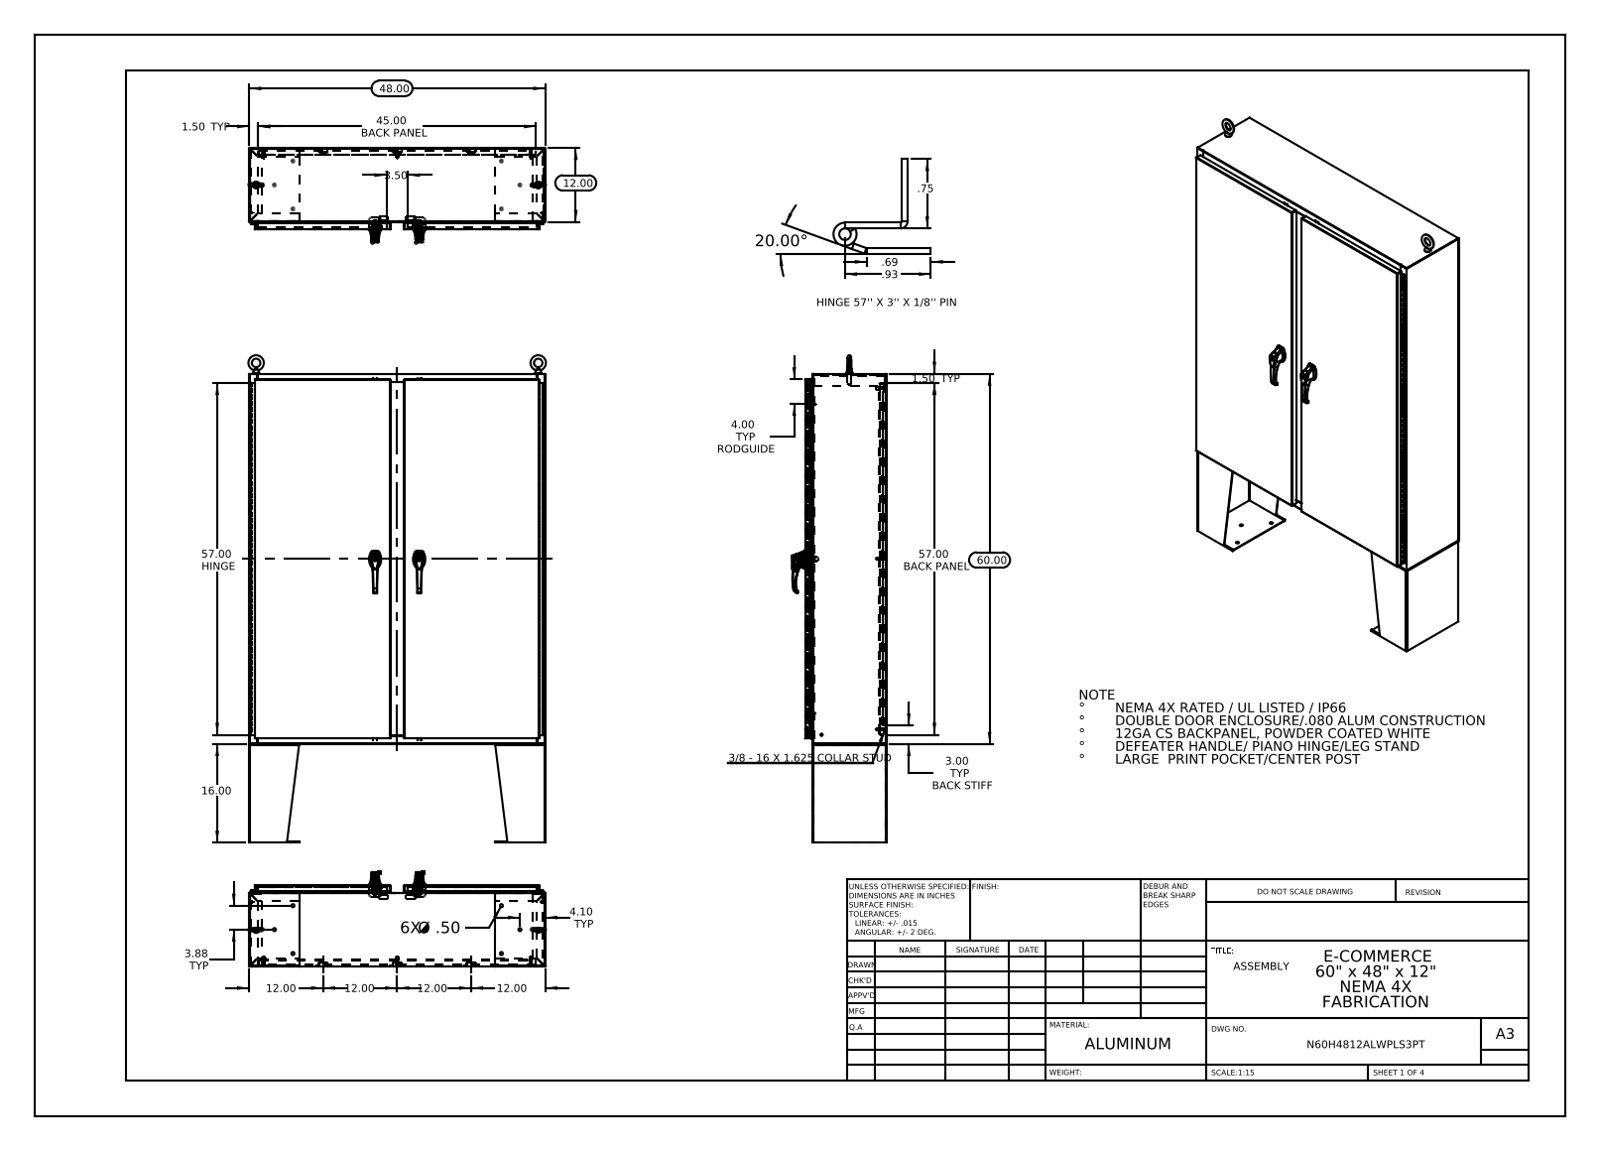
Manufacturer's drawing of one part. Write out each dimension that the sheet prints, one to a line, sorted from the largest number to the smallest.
60.00
57.00 HINGE
57.00 BACK PANEL
48.00
45.00 BACK PANEL
20.00°
16.00
12.00
12.00
12.00
12.00
12.00
4.10 TYP
4.00 TYP RODGUIDE
3.88 TYP
3.50
3.00 TYP BACK STIFF
1.50 TYP
1.50 TYP
.93
.75
.69
6X Ø .50
